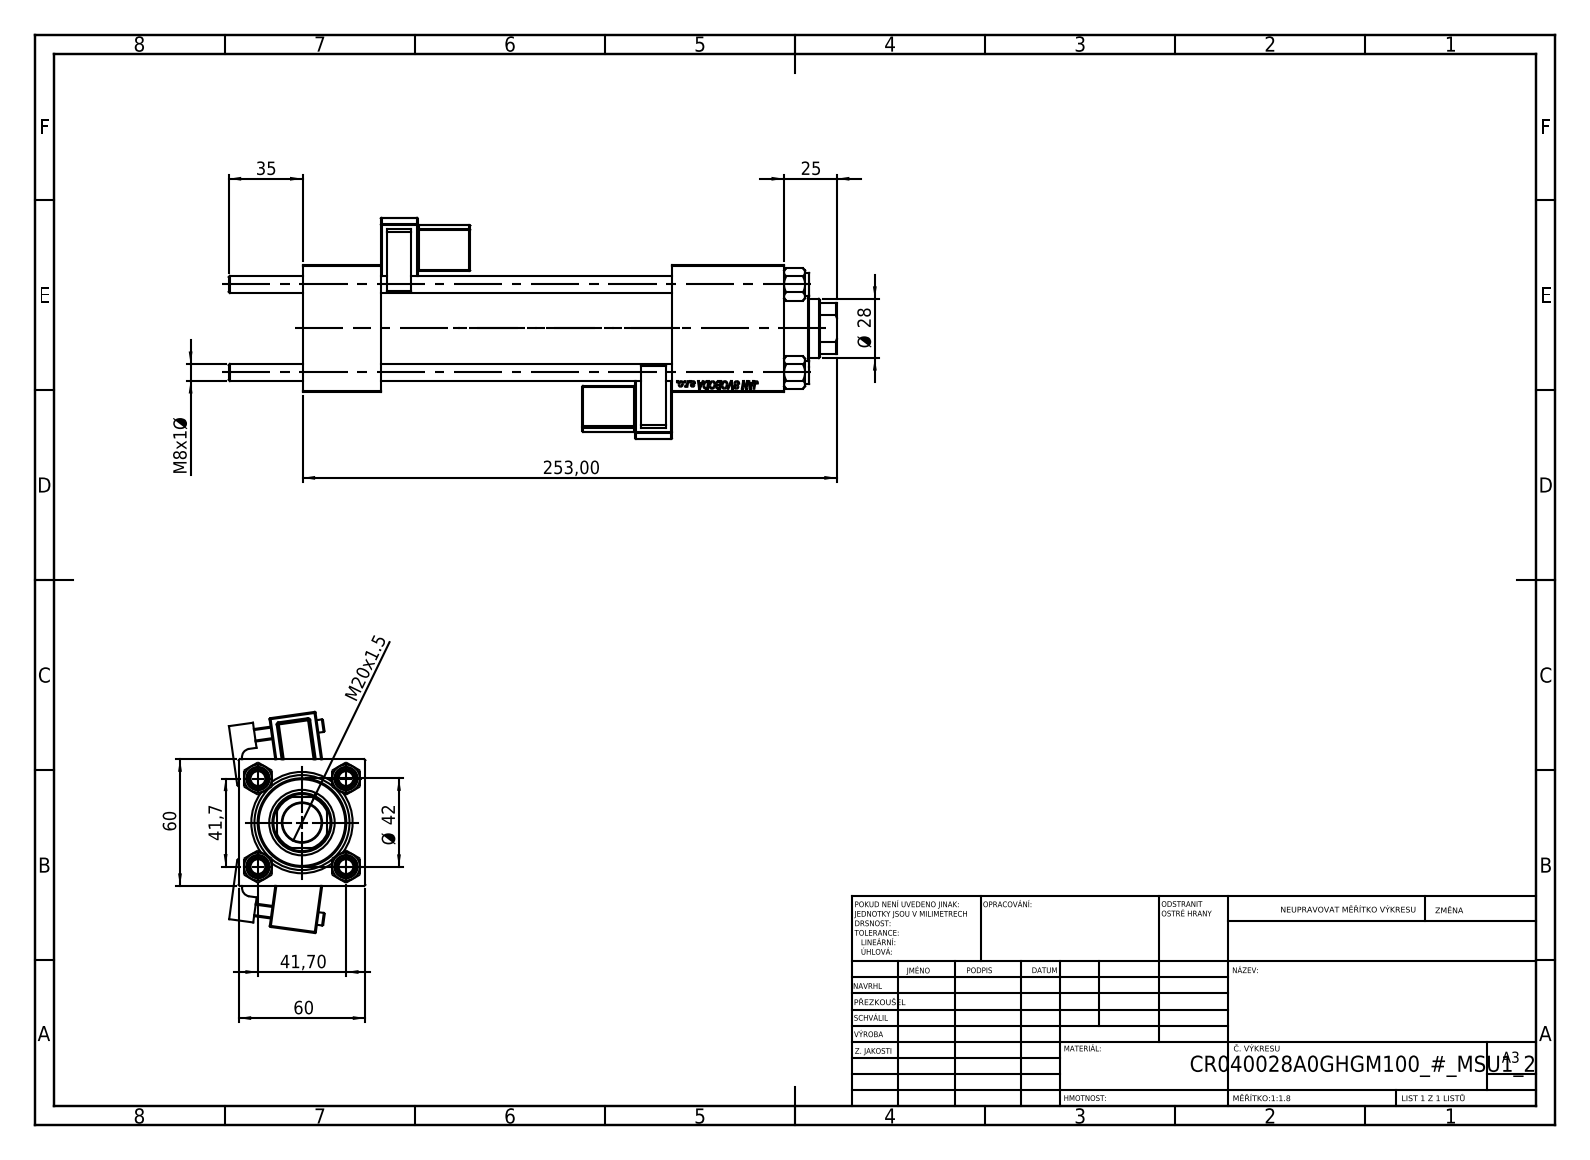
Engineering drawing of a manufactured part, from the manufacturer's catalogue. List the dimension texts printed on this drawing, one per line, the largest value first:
253,00
60
60
Ø 42
41,7
41,70
35
Ø 28
25
M20x1.5
M8x1 Ø
